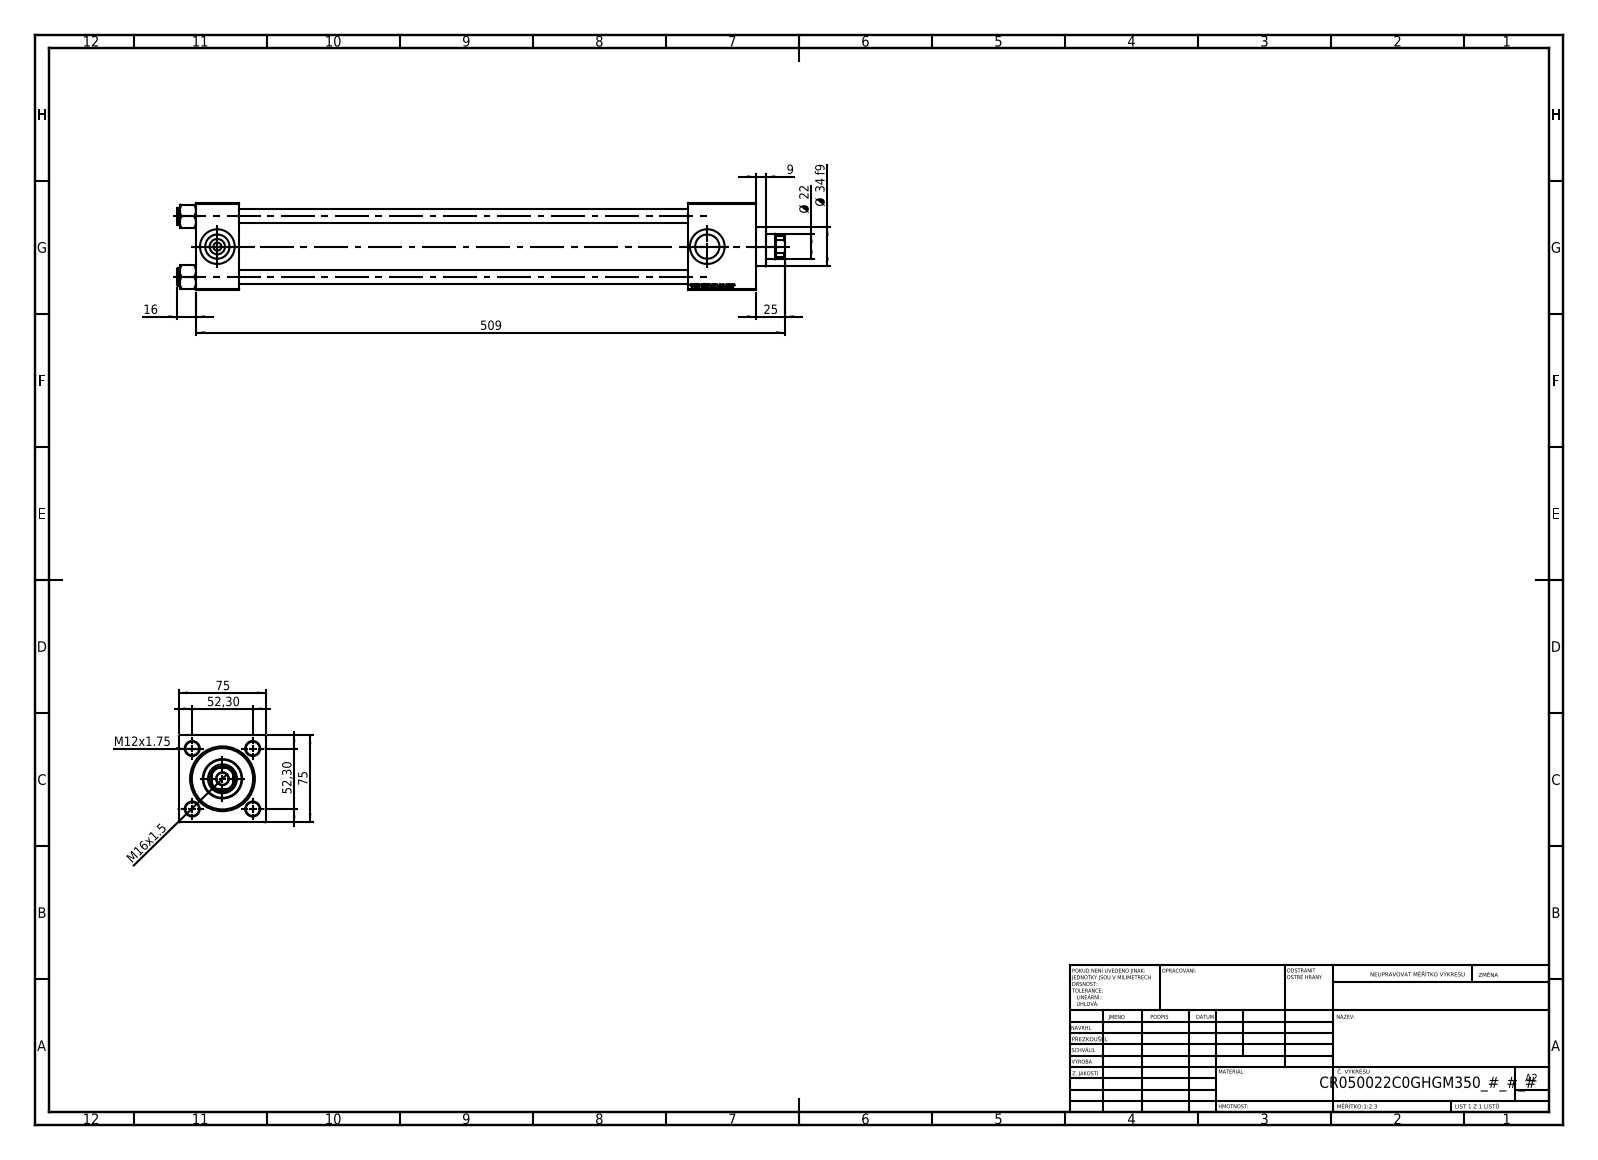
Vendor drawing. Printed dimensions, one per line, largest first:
509
75
75
52,30
52,30
Ø 34 f9
25
Ø 22
16
M16x1.5
M12x1.75
9
